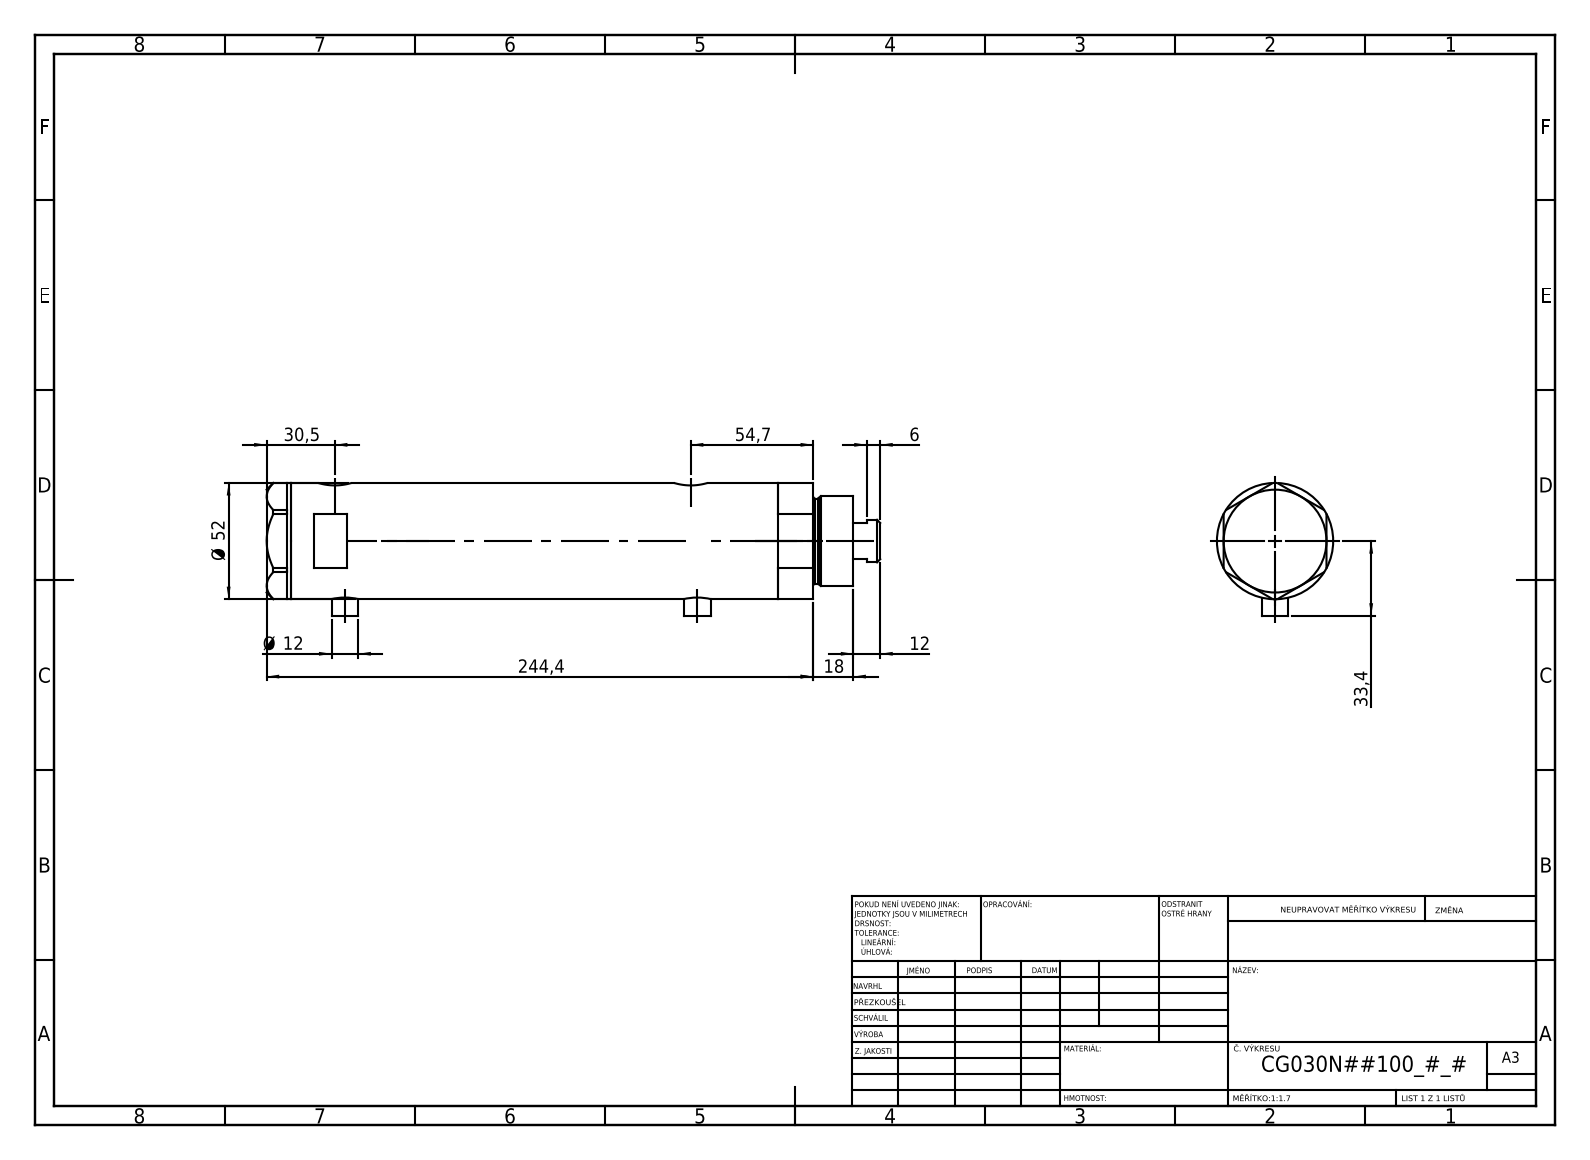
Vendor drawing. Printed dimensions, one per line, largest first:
244,4
54,7
Ø 52
33,4
30,5
18
12
Ø 12
6
